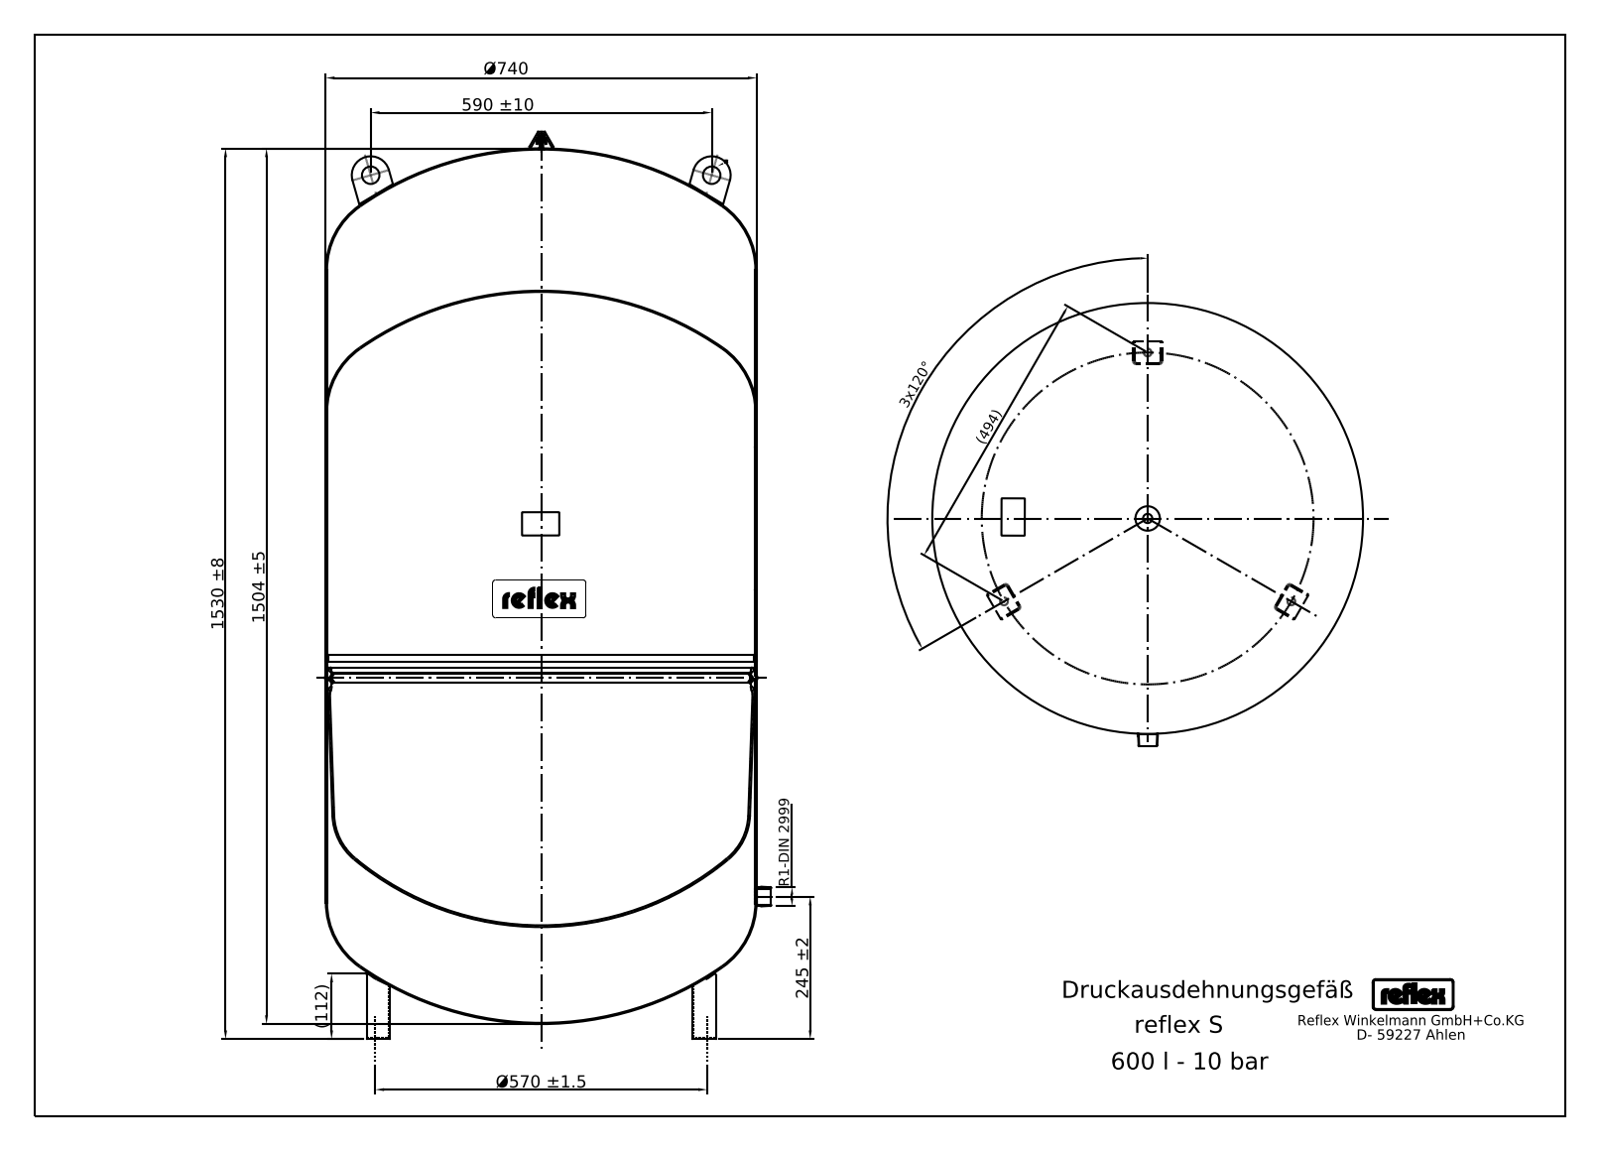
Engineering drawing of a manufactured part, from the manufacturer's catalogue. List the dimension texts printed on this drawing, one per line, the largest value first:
1530 ±8
1504 ±5
Ø740
590 ±10
Ø570 ±1.5
(494)
245 ±2
3x120°
(112)
R1-DIN 2999
